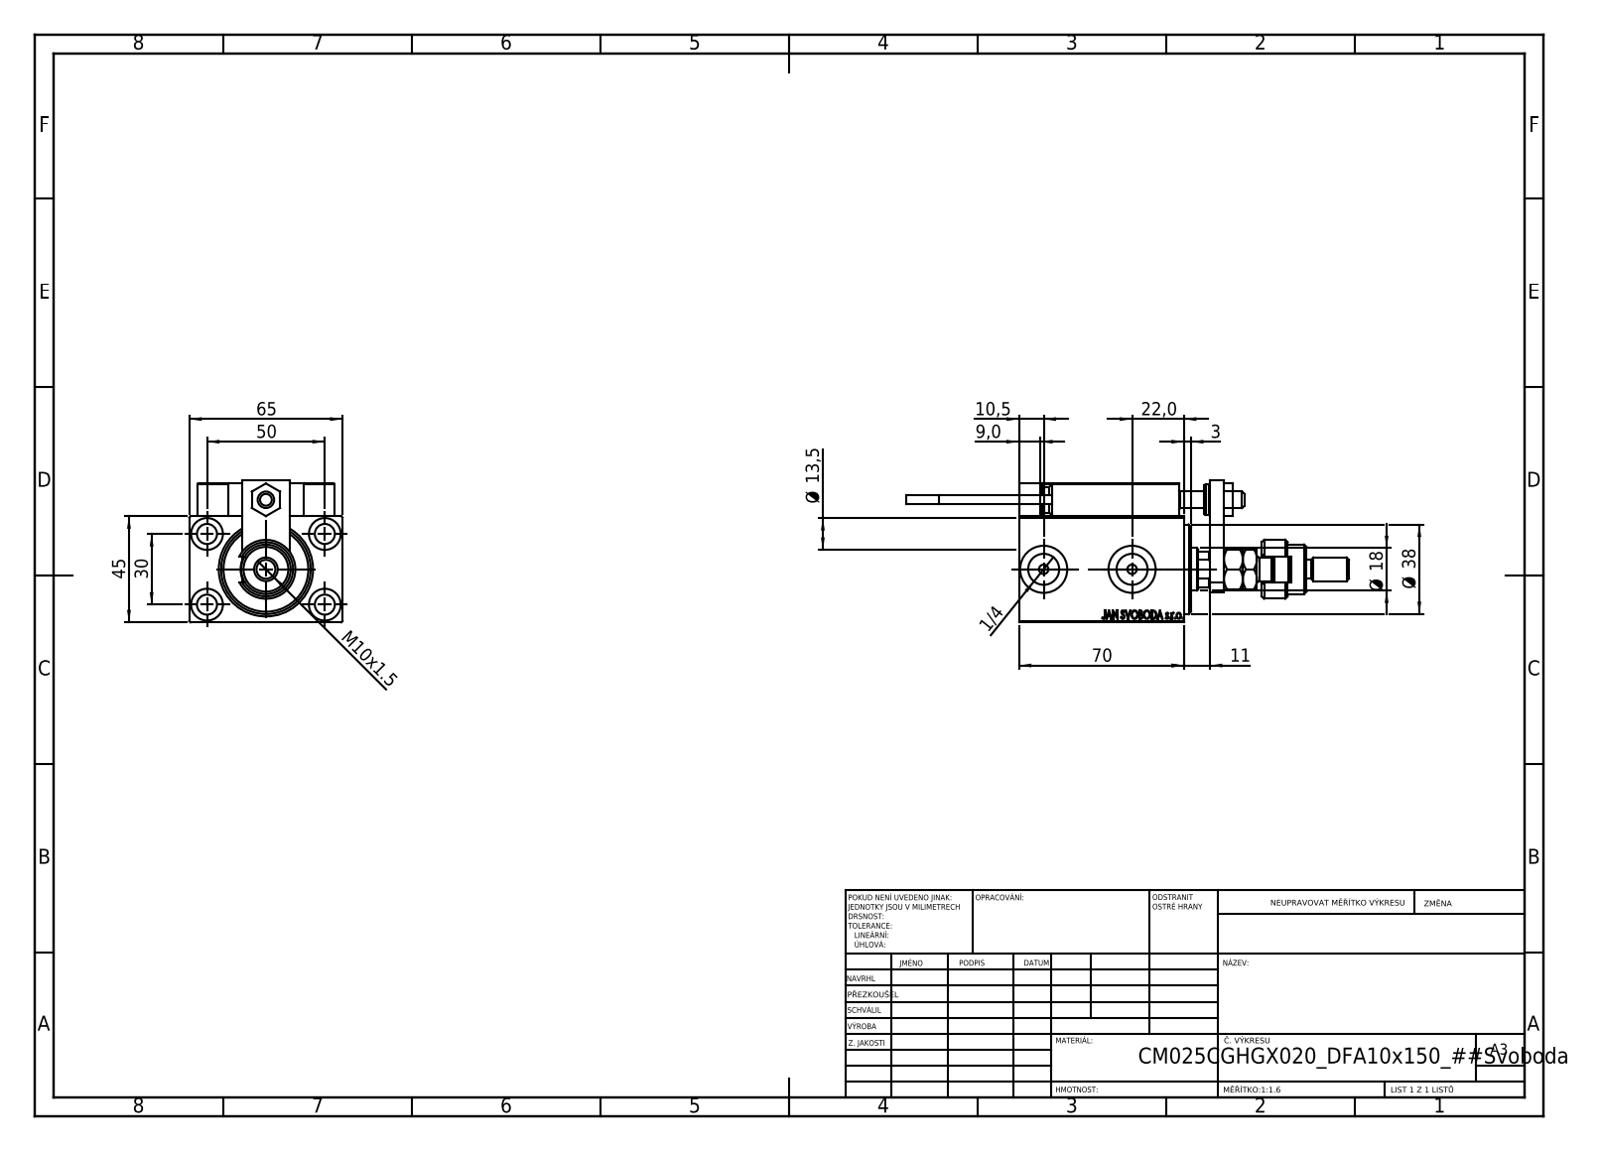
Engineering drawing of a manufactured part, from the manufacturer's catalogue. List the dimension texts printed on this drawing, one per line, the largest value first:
70
65
50
45
Ø 38
30
22,0
Ø 18
Ø 13,5
11
10,5
M10x1.5
9,0
3
1/4
